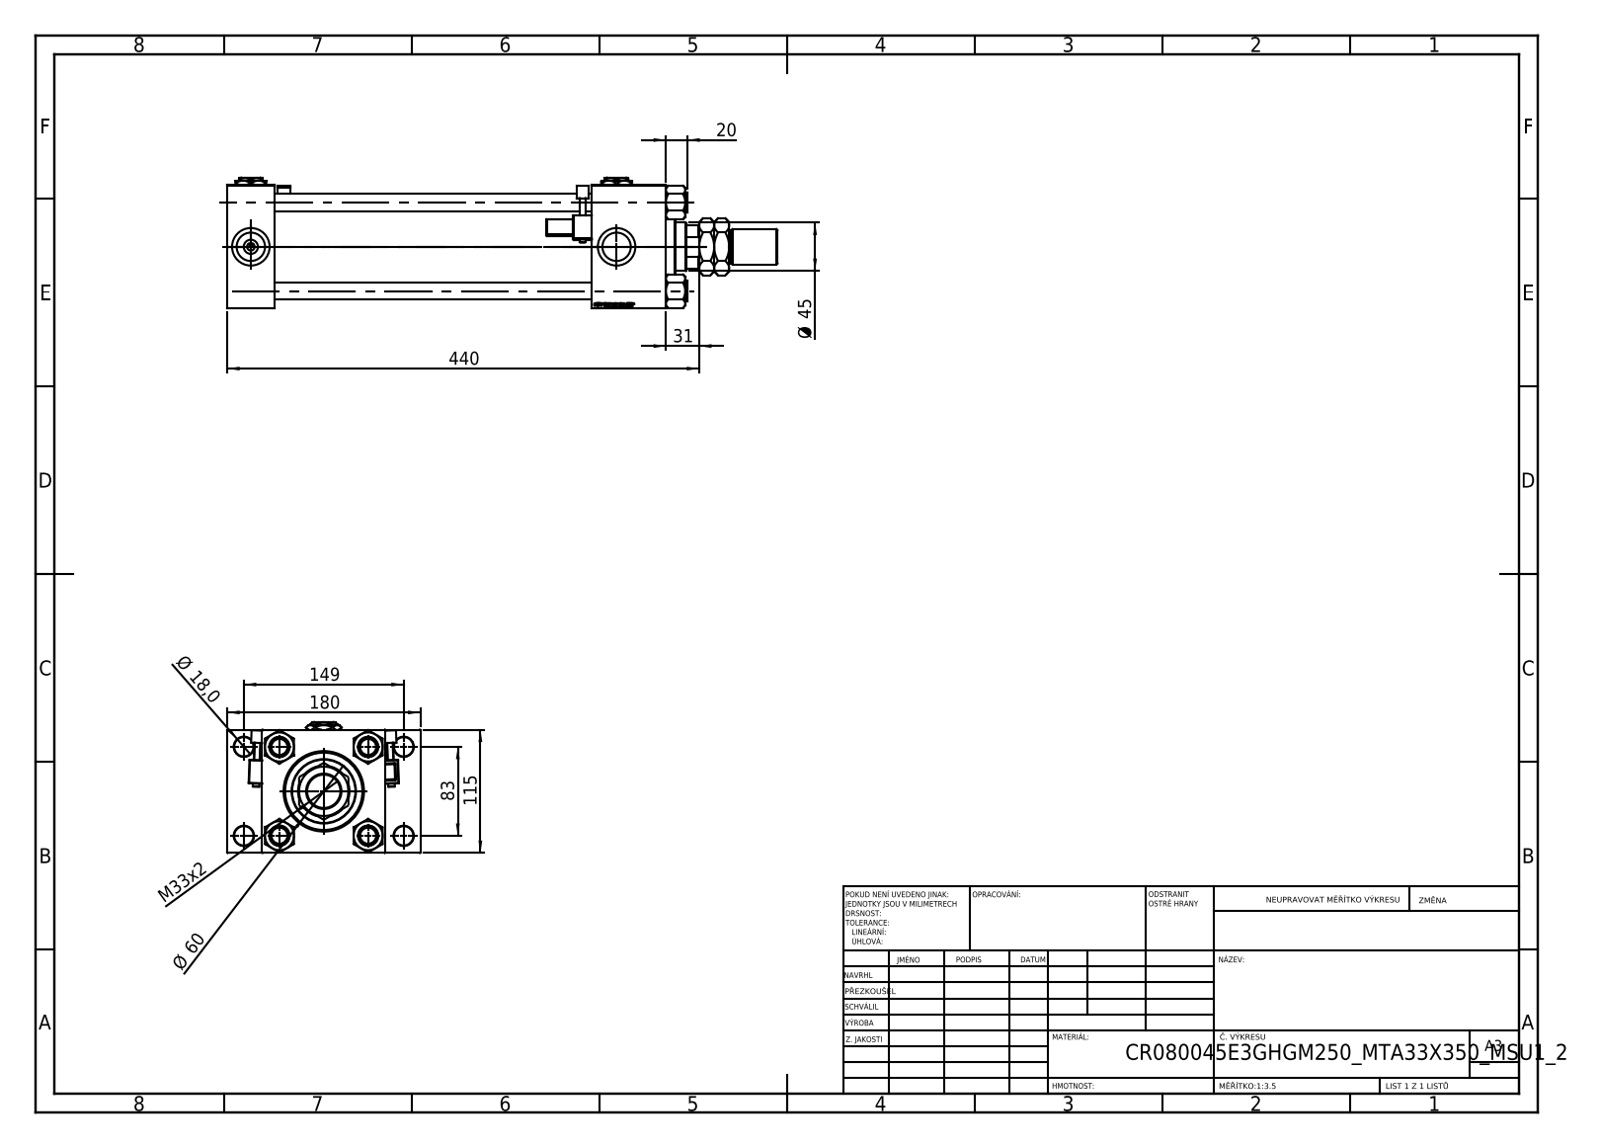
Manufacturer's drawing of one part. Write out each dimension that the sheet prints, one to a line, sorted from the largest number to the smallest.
440
180
149
115
83
Ø 60
Ø 45
M33x2
31
20
Ø 18,0
